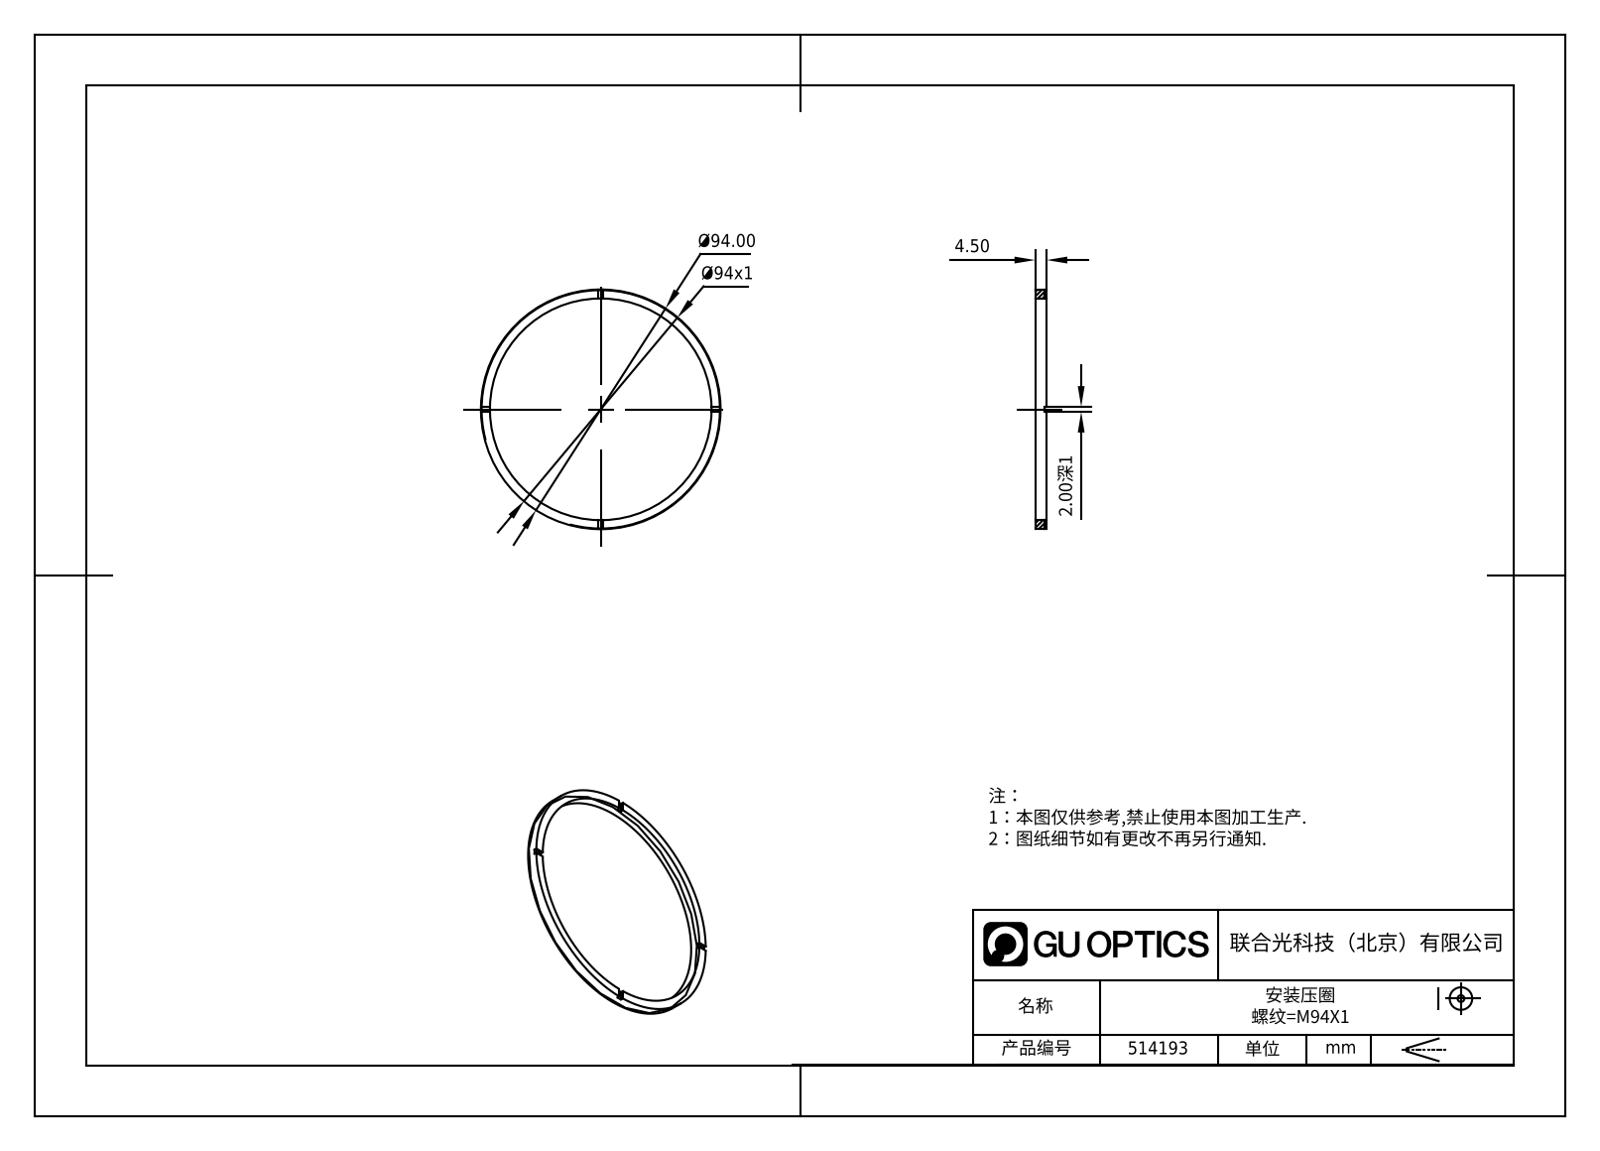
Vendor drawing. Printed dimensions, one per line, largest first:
Ø94.00
Ø94x1
4.50
2.00深1
